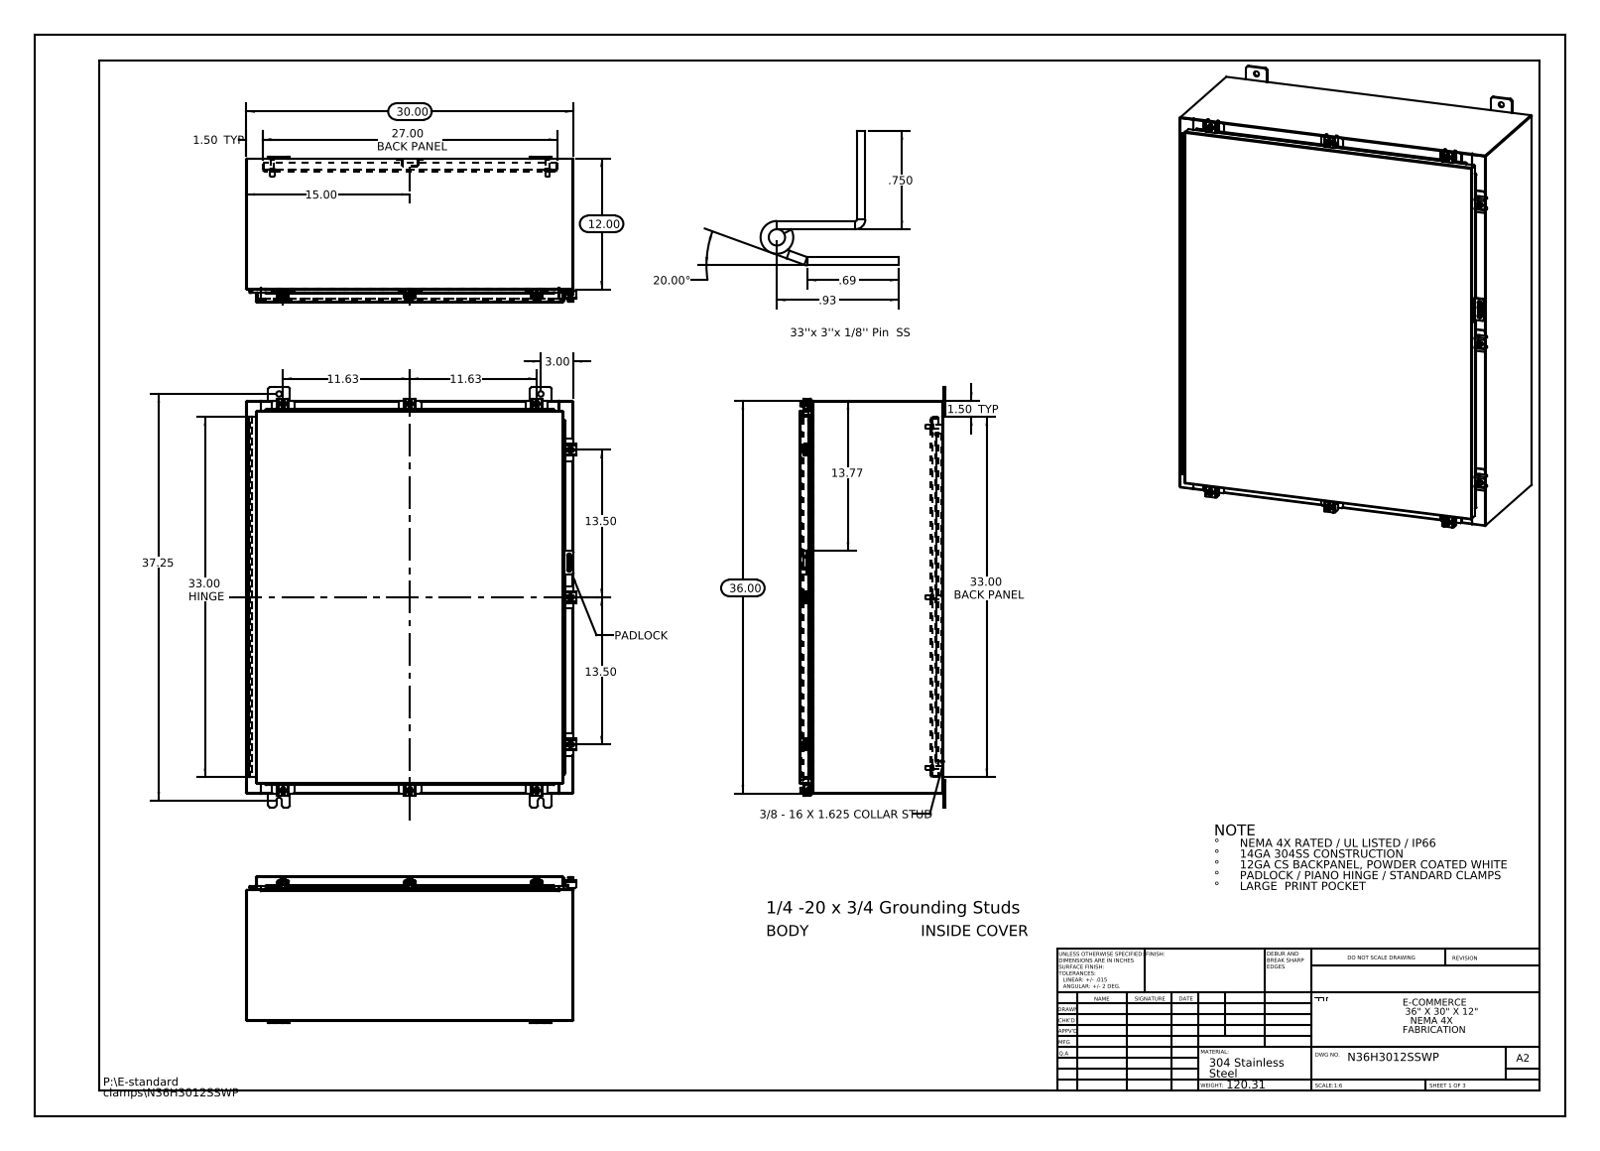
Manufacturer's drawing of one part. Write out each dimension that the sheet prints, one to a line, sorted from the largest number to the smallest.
37.25
36.00
33.00 HINGE
33.00 BACK PANEL
30.00
27.00 BACK PANEL
20.00°
15.00
13.77
13.50
13.50
12.00
11.63
11.63
3.00
1.50 TYP
1.50 TYP
.93
.750
.69
